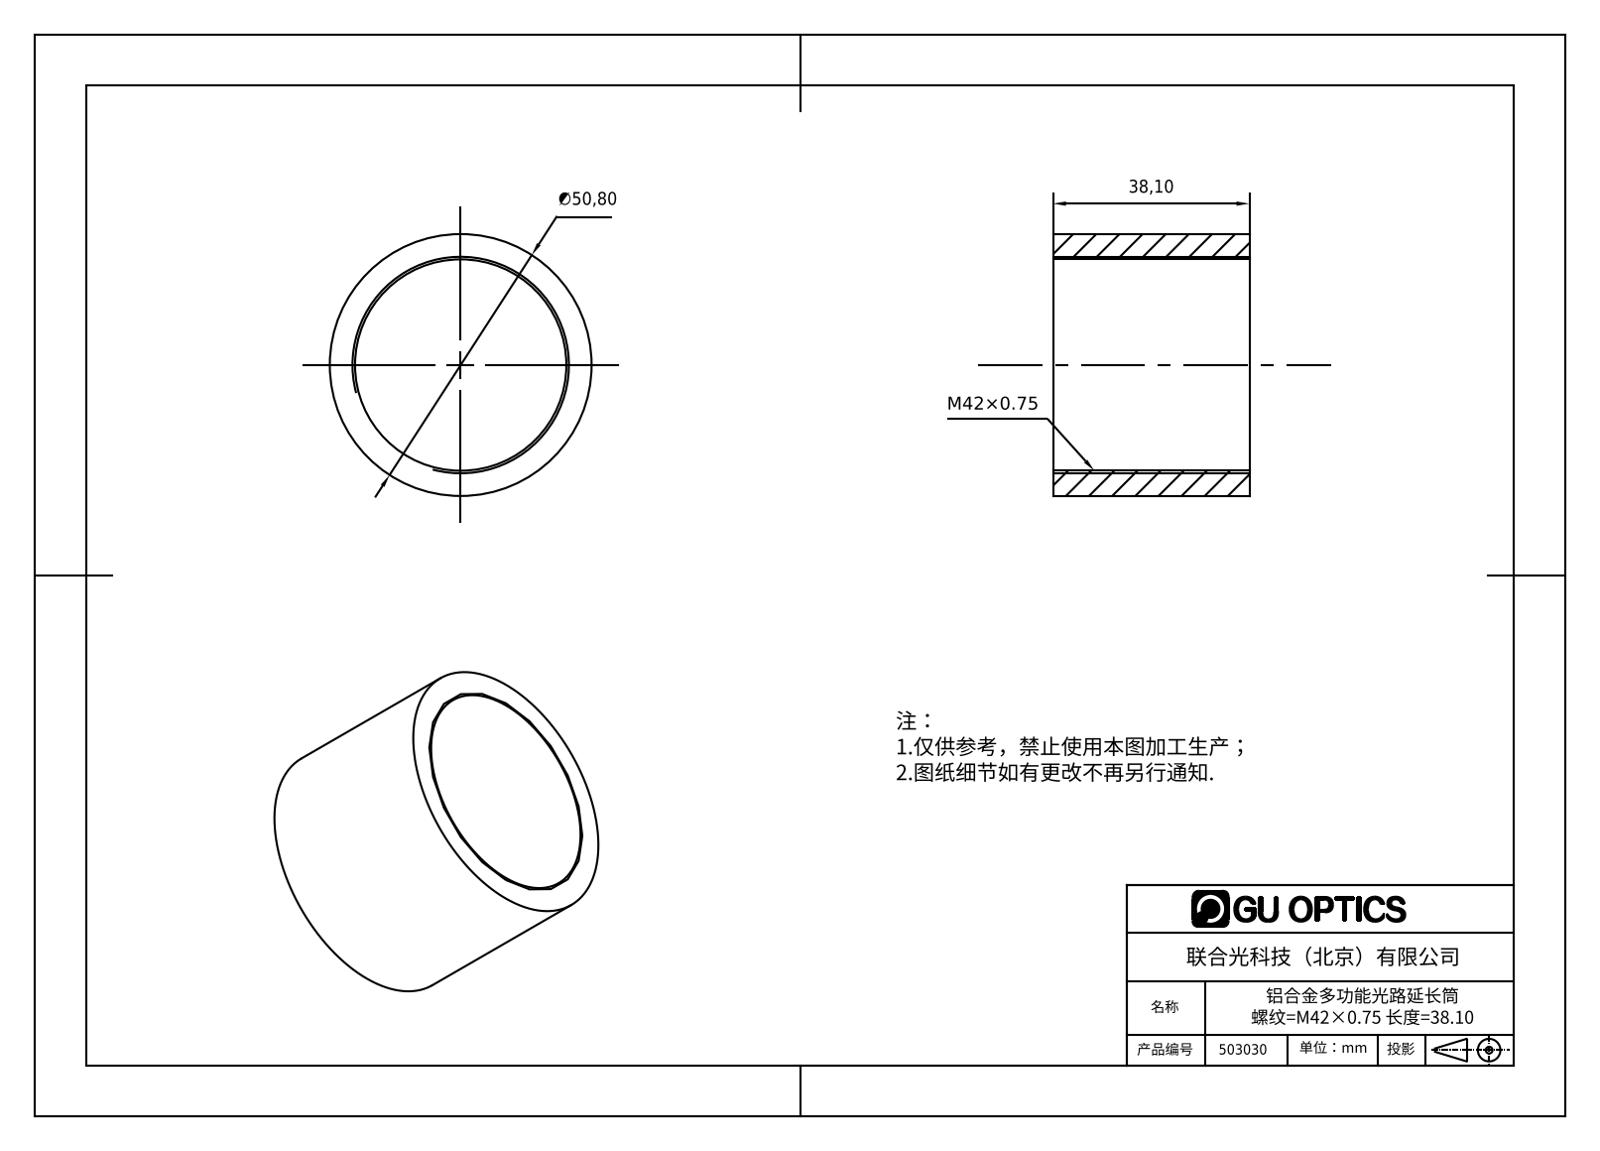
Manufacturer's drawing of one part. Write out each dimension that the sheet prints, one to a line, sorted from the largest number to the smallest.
∅50,80
38,10
